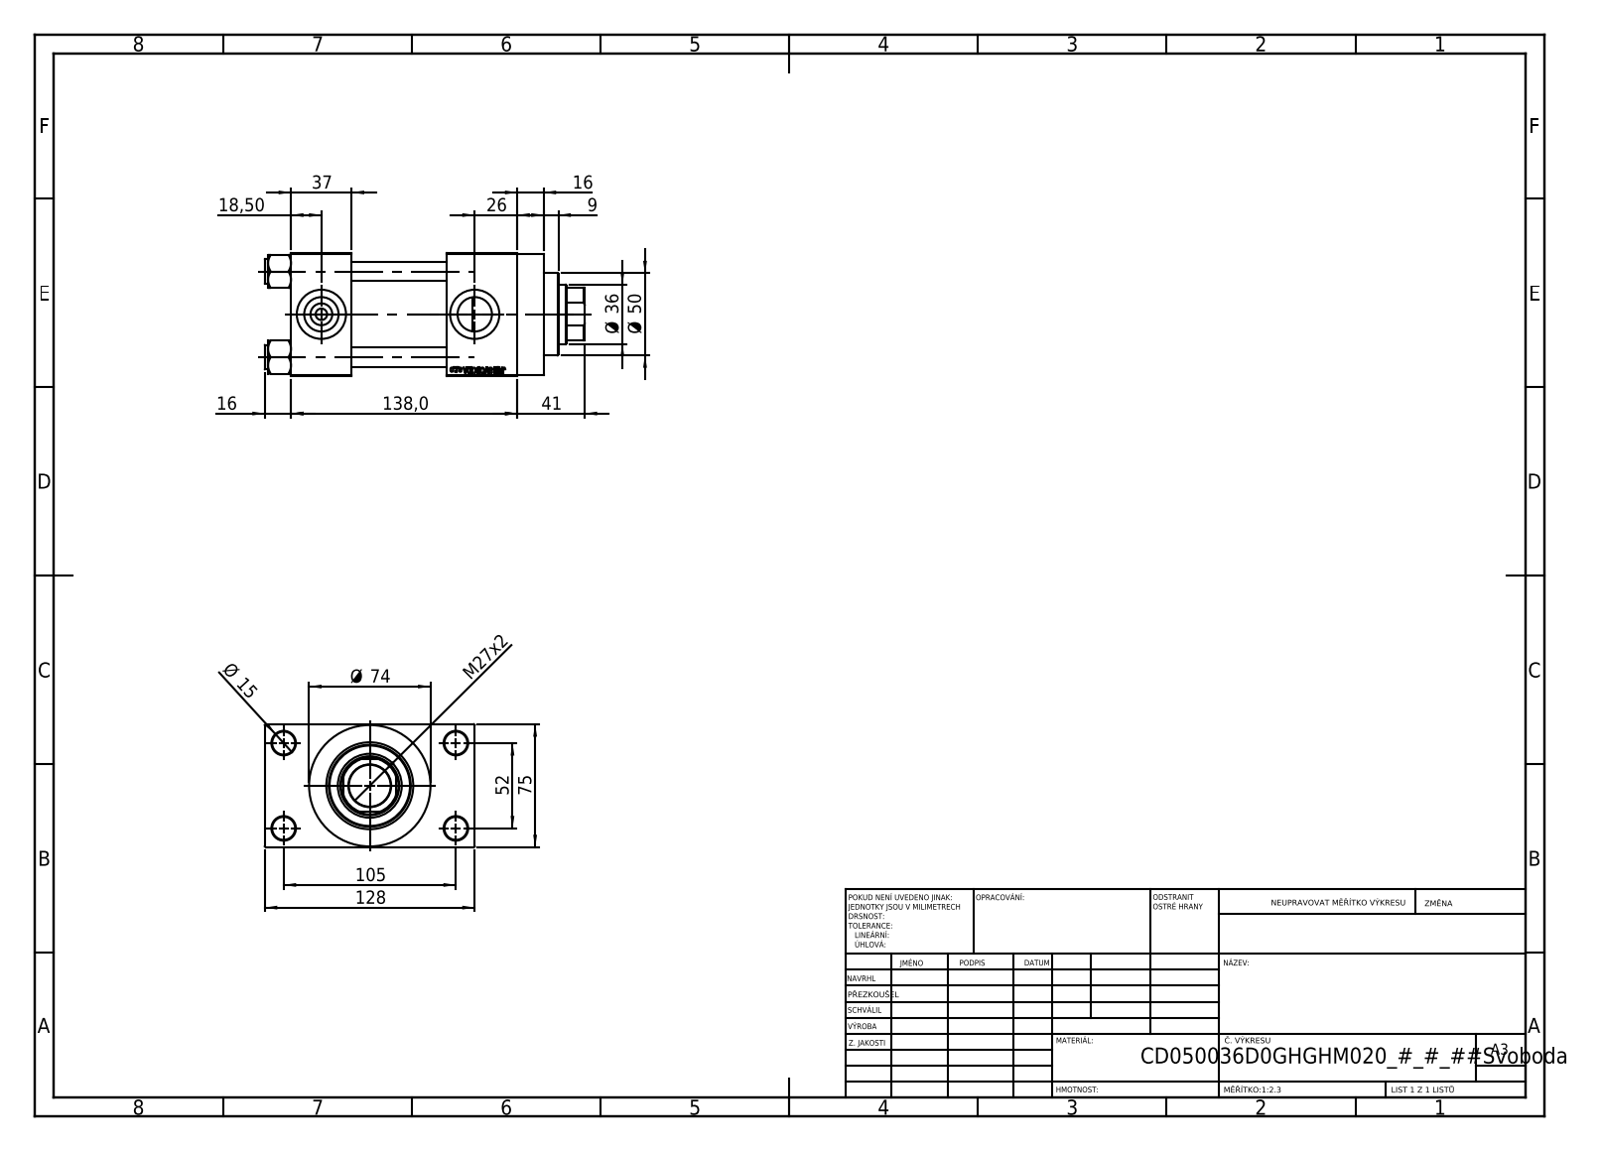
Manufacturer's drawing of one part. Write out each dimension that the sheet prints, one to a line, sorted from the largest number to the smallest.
138,0
128
105
75
Ø 74
52
Ø 50
41
37
Ø 36
M27x2
26
18,50
16
16
Ø 15
9
